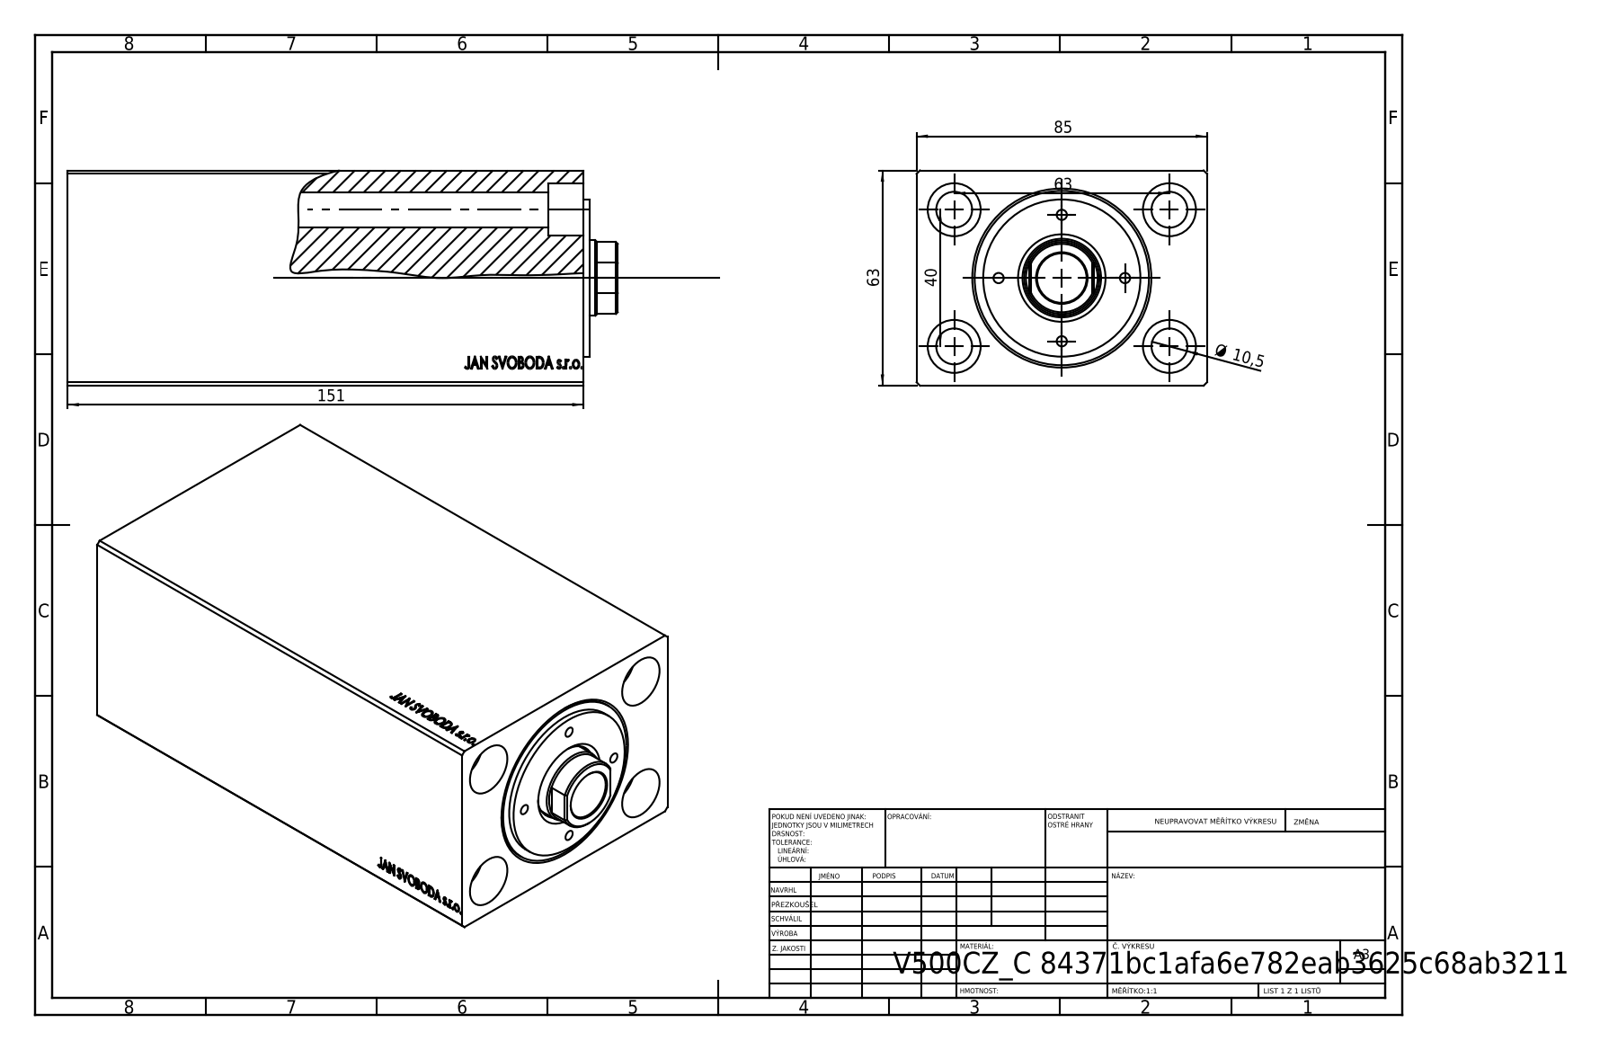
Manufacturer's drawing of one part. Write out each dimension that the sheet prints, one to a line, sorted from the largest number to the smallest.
151
85
63
63
40
Ø 10,5
